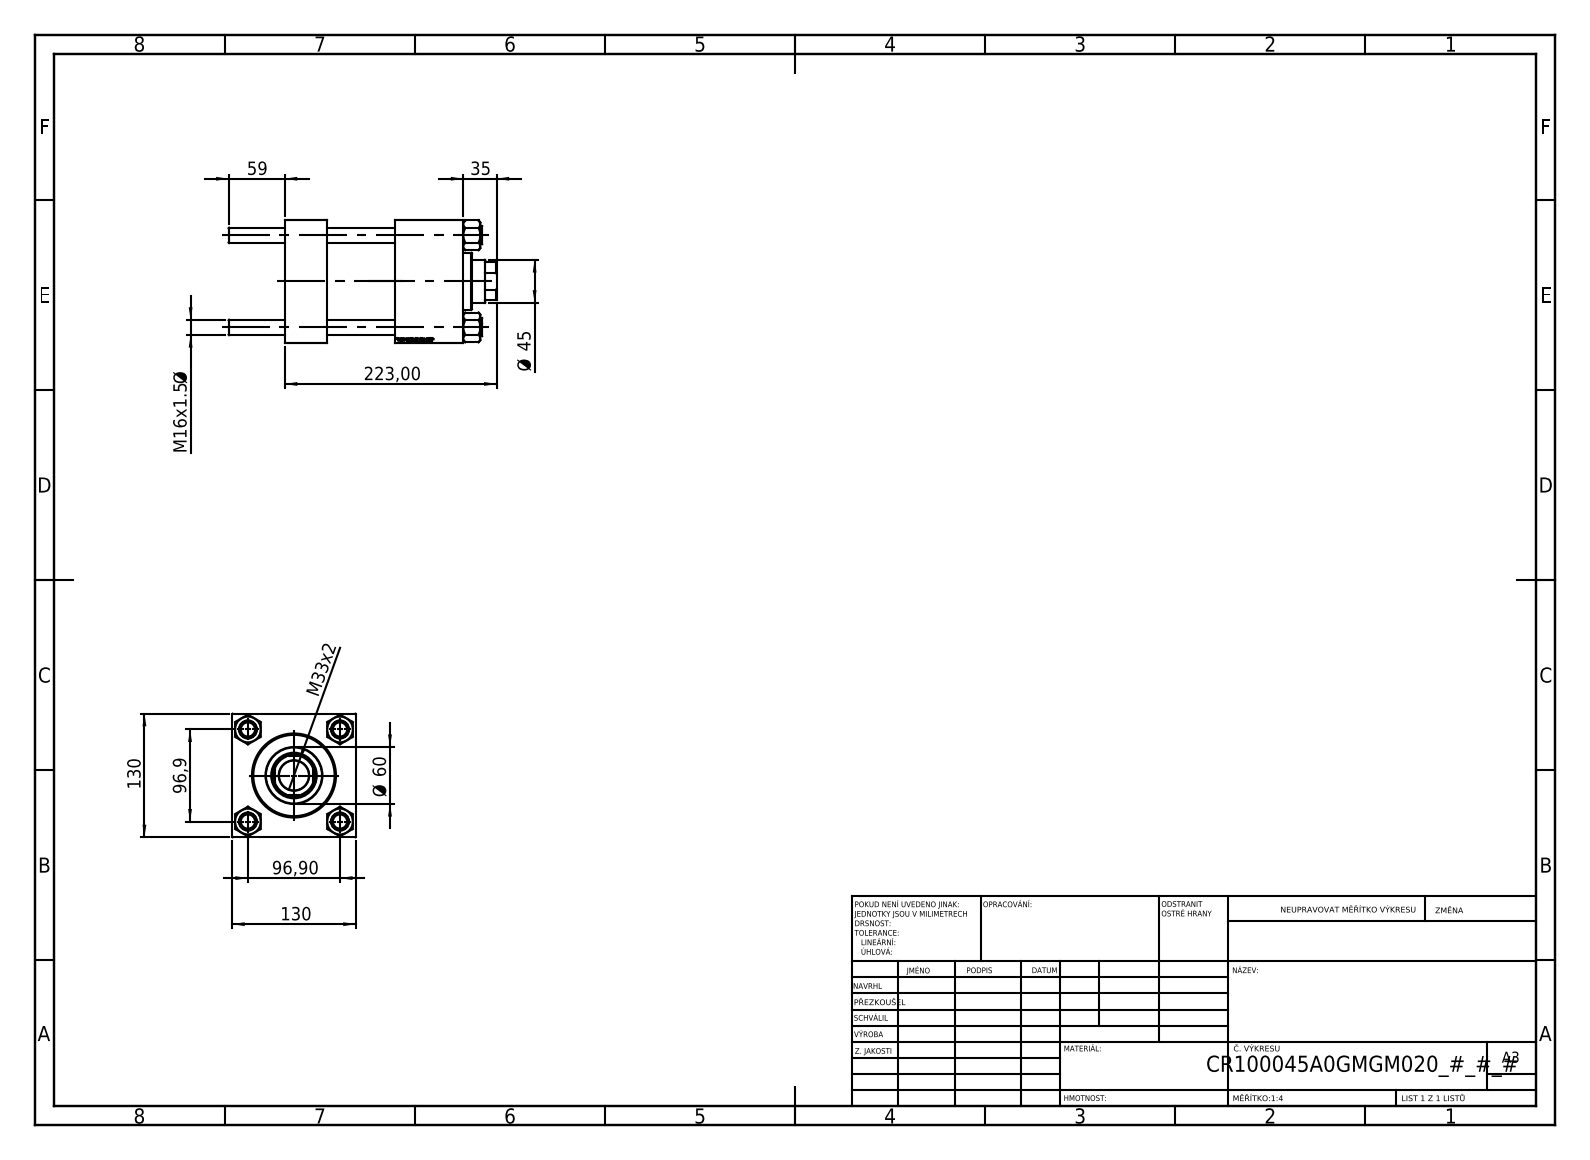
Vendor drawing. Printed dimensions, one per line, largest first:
223,00
130
130
96,9
96,90
Ø 60
59
Ø 45
35
M33x2
M16x1.5 Ø
